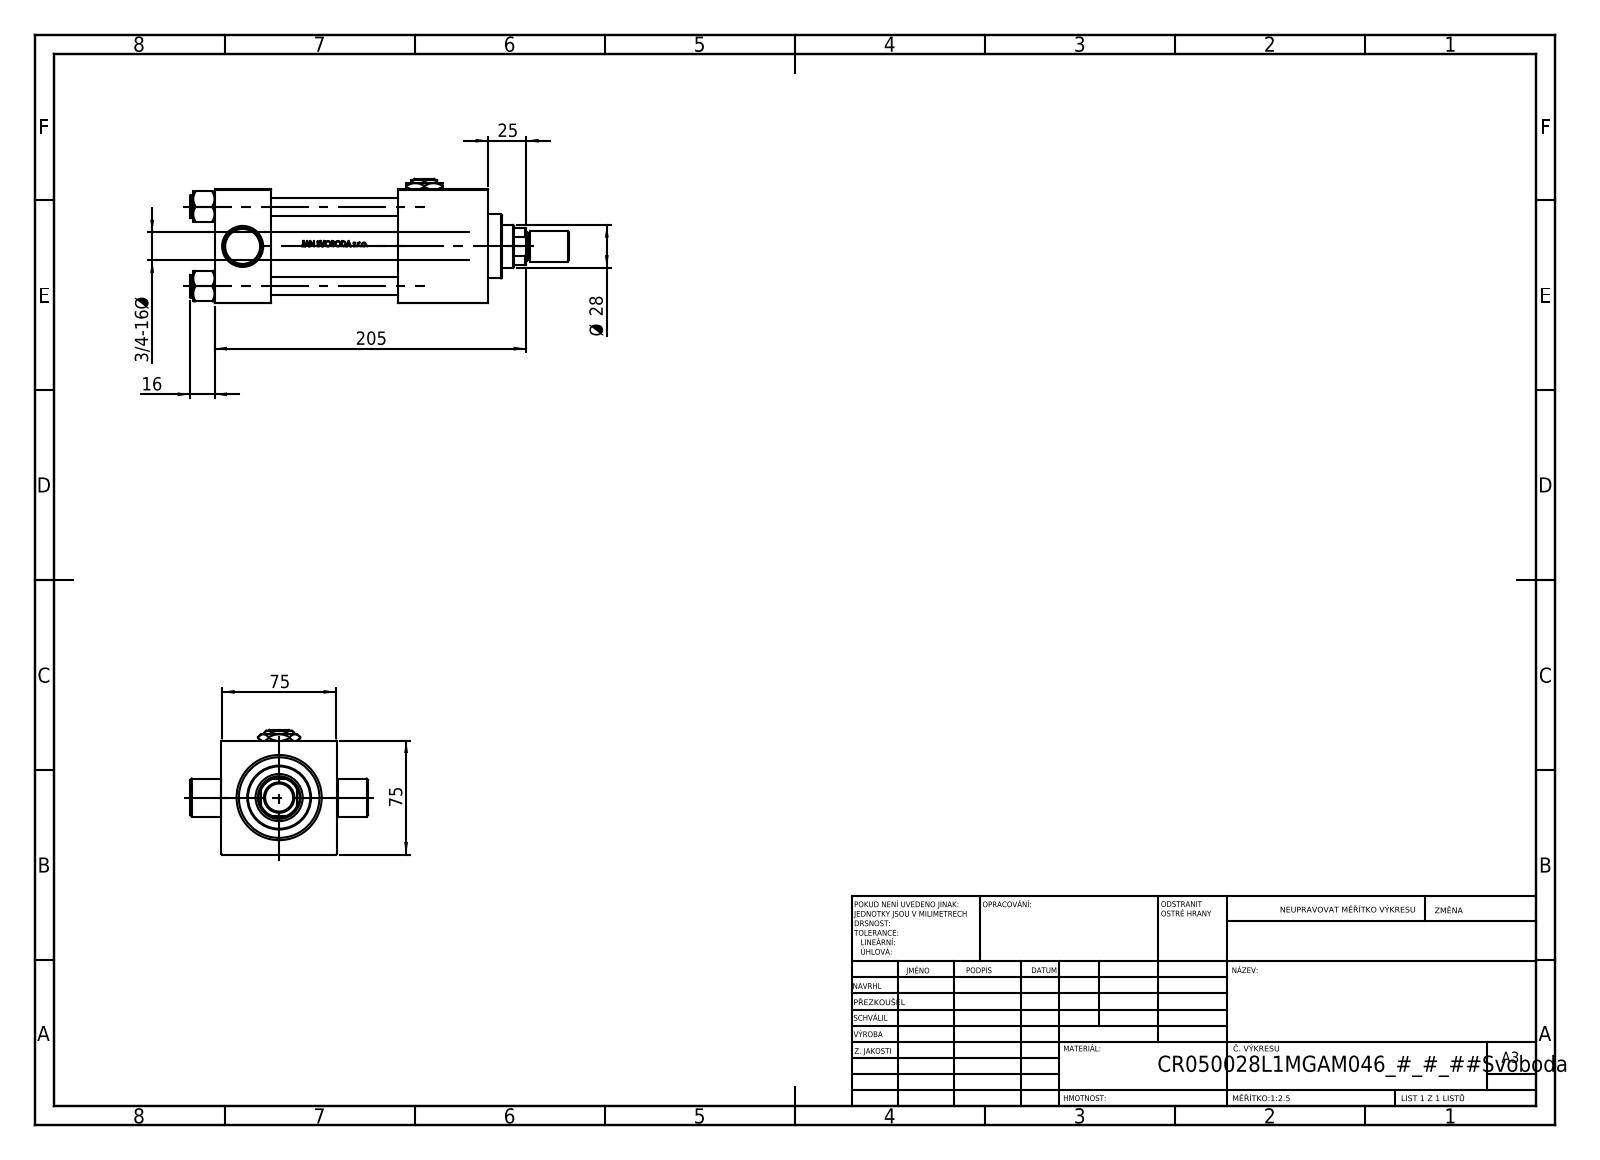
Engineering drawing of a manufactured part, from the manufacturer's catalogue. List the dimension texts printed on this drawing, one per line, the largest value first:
205
75
75
Ø 28
25
16
3/4-16 Ø
